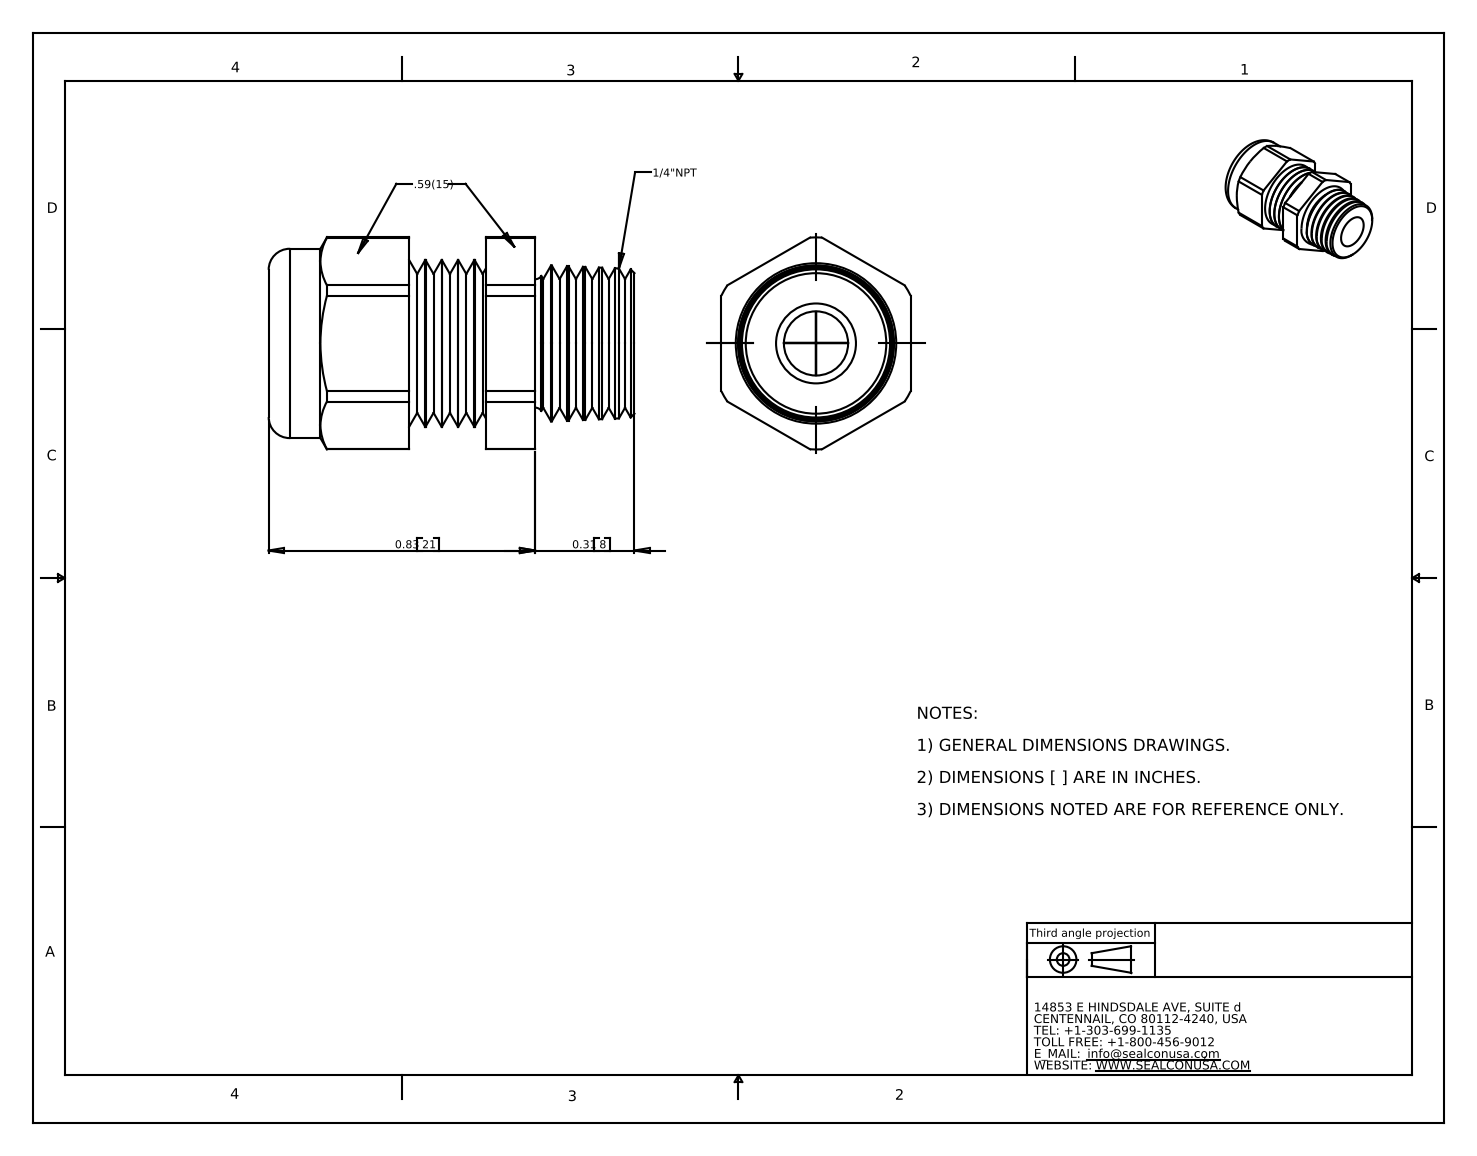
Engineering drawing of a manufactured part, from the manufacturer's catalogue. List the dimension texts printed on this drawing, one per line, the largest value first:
0.83 21
0.31 8
